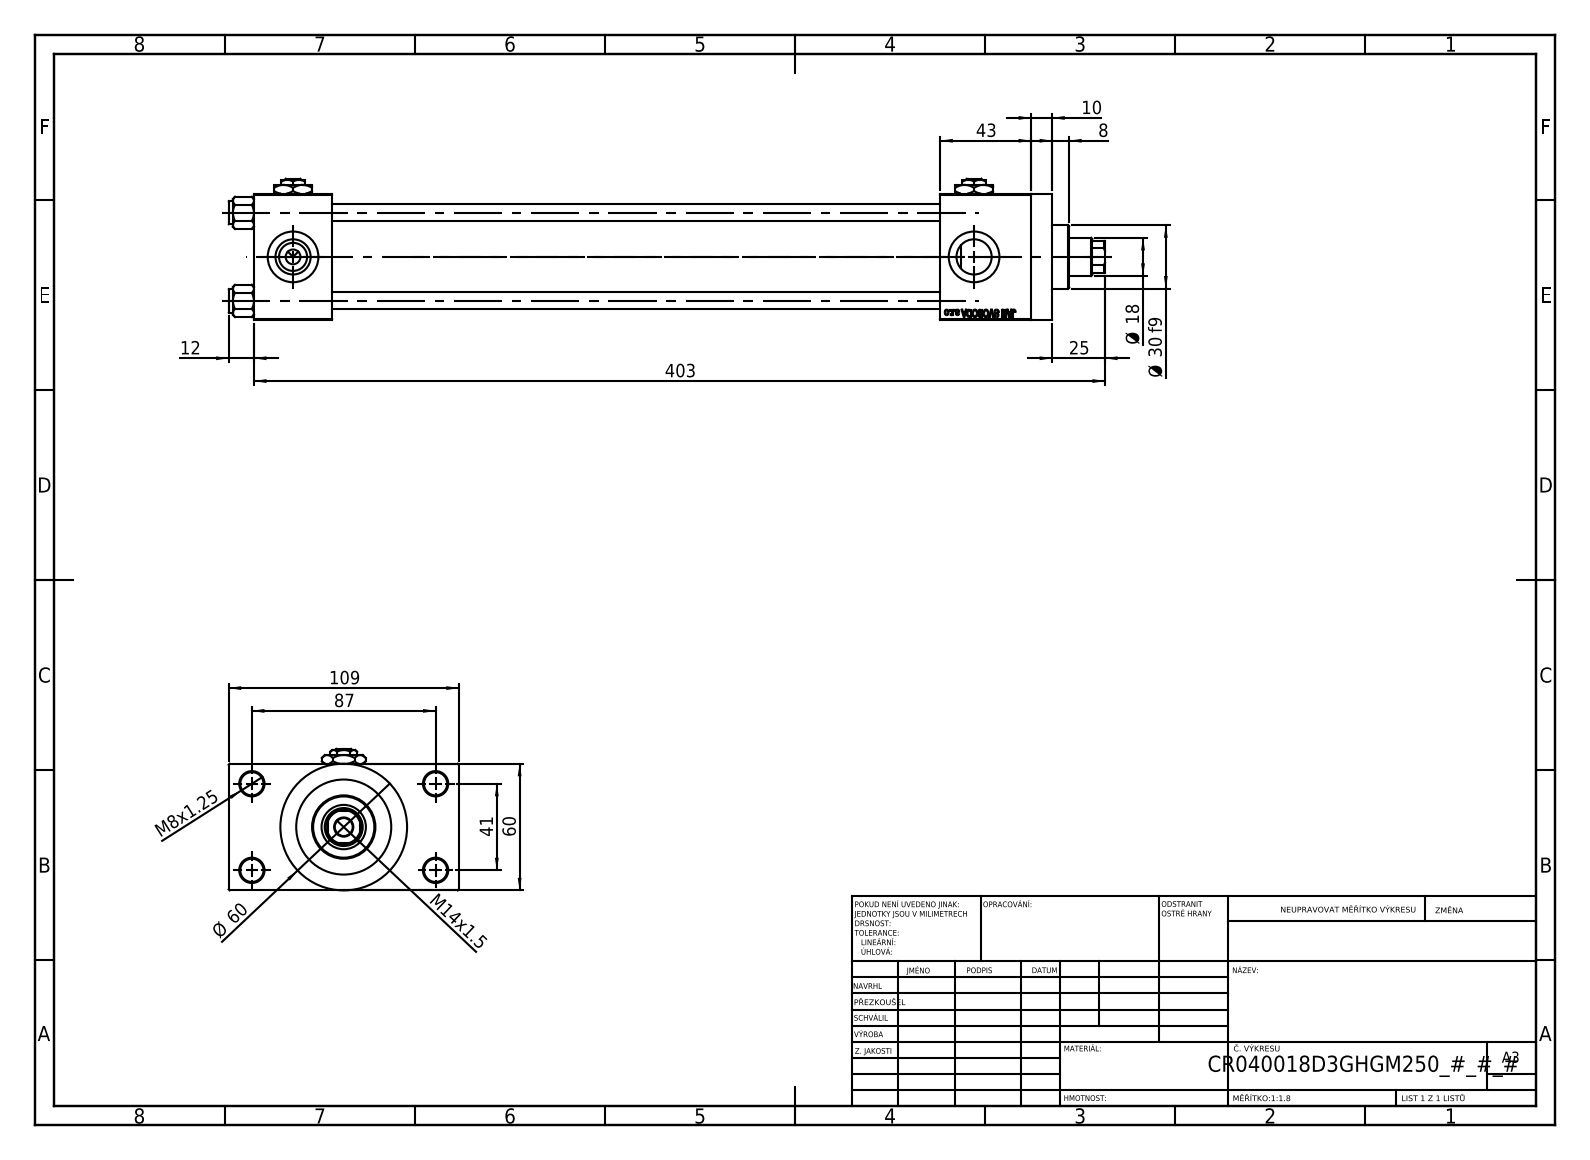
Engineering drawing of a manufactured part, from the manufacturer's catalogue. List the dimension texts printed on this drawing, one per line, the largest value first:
403
109
87
Ø 60
60
43
41
Ø 30 f9
25
Ø 18
M14x1.5
12
10
8
M8x1.25
